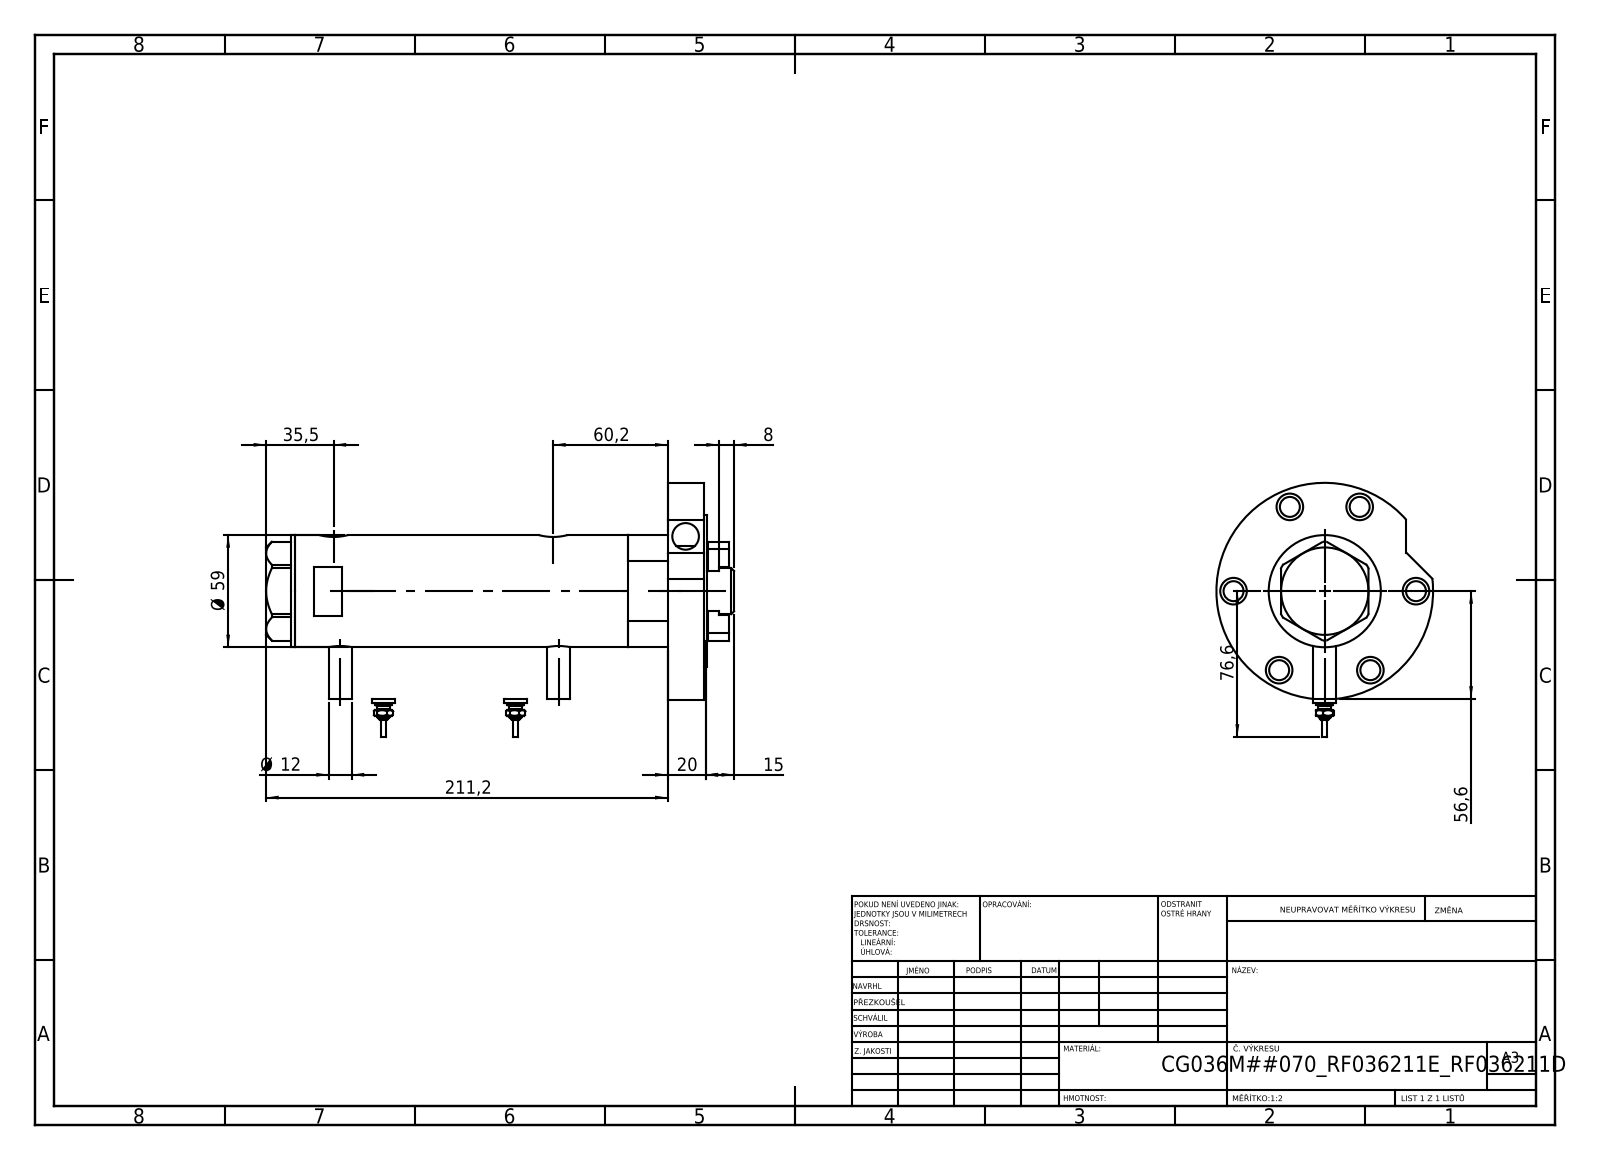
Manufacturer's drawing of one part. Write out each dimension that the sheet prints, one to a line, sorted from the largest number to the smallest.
211,2
76,6
60,2
Ø 59
56,6
35,5
20
15
Ø 12
8
